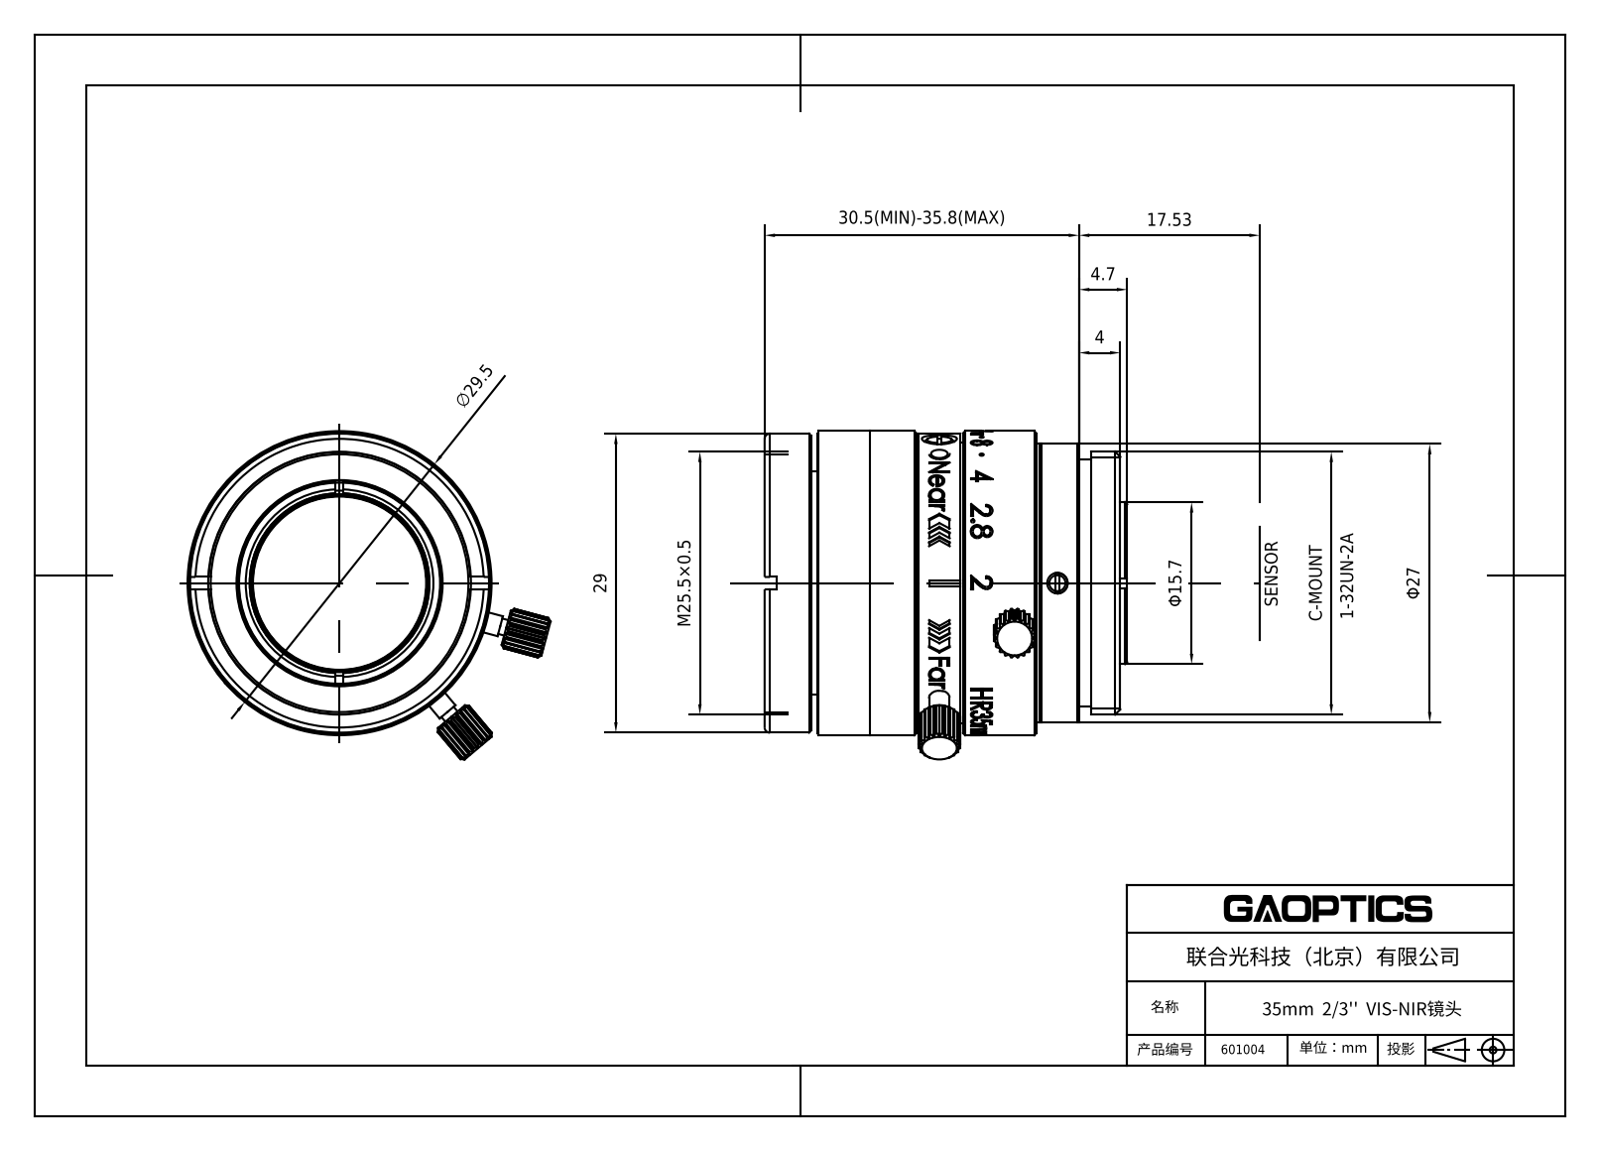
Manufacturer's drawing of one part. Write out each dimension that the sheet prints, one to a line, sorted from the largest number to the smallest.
30.5(MIN)-35.8(MAX)
∅29.5
29
Φ27
M25.5×0.5
17.53
Φ15.7
4.7
4
C-MOUNT
